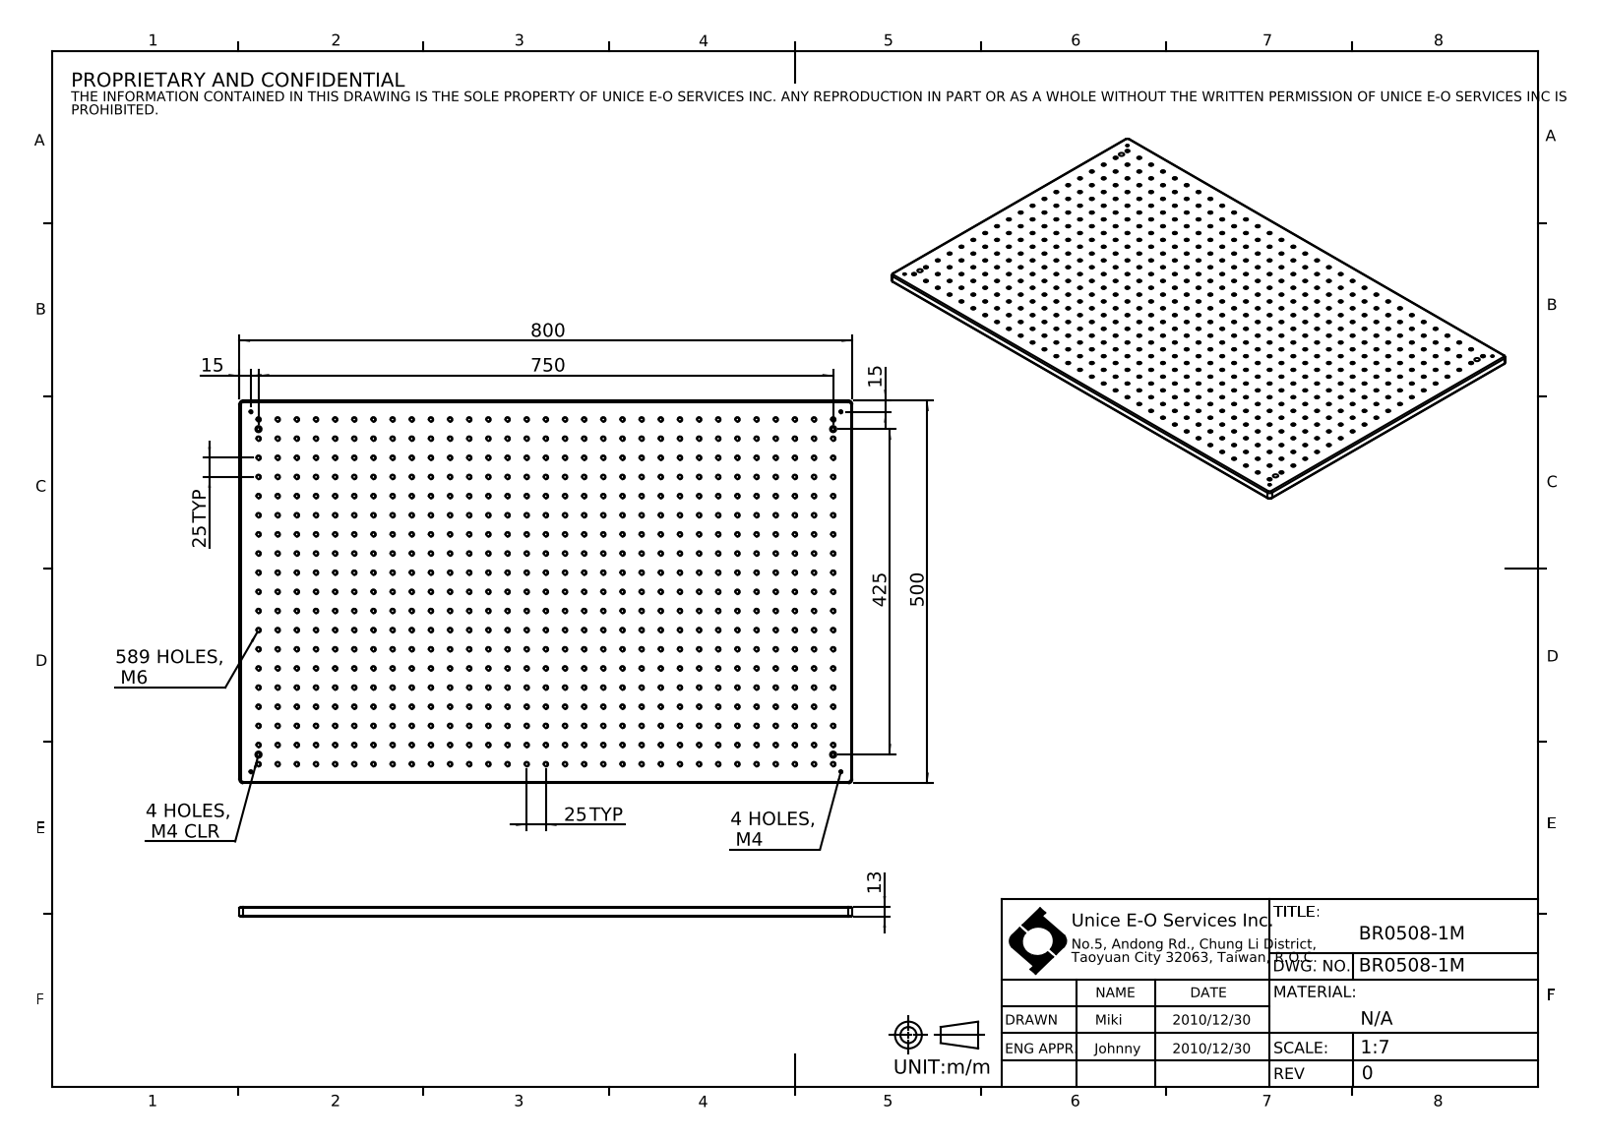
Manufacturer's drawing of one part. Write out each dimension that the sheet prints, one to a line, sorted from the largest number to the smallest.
800
750
589 HOLES, M6
500
425
25 TYP
25 TYP
15
15
13
4 HOLES, M4
4 HOLES, M4 CLR
